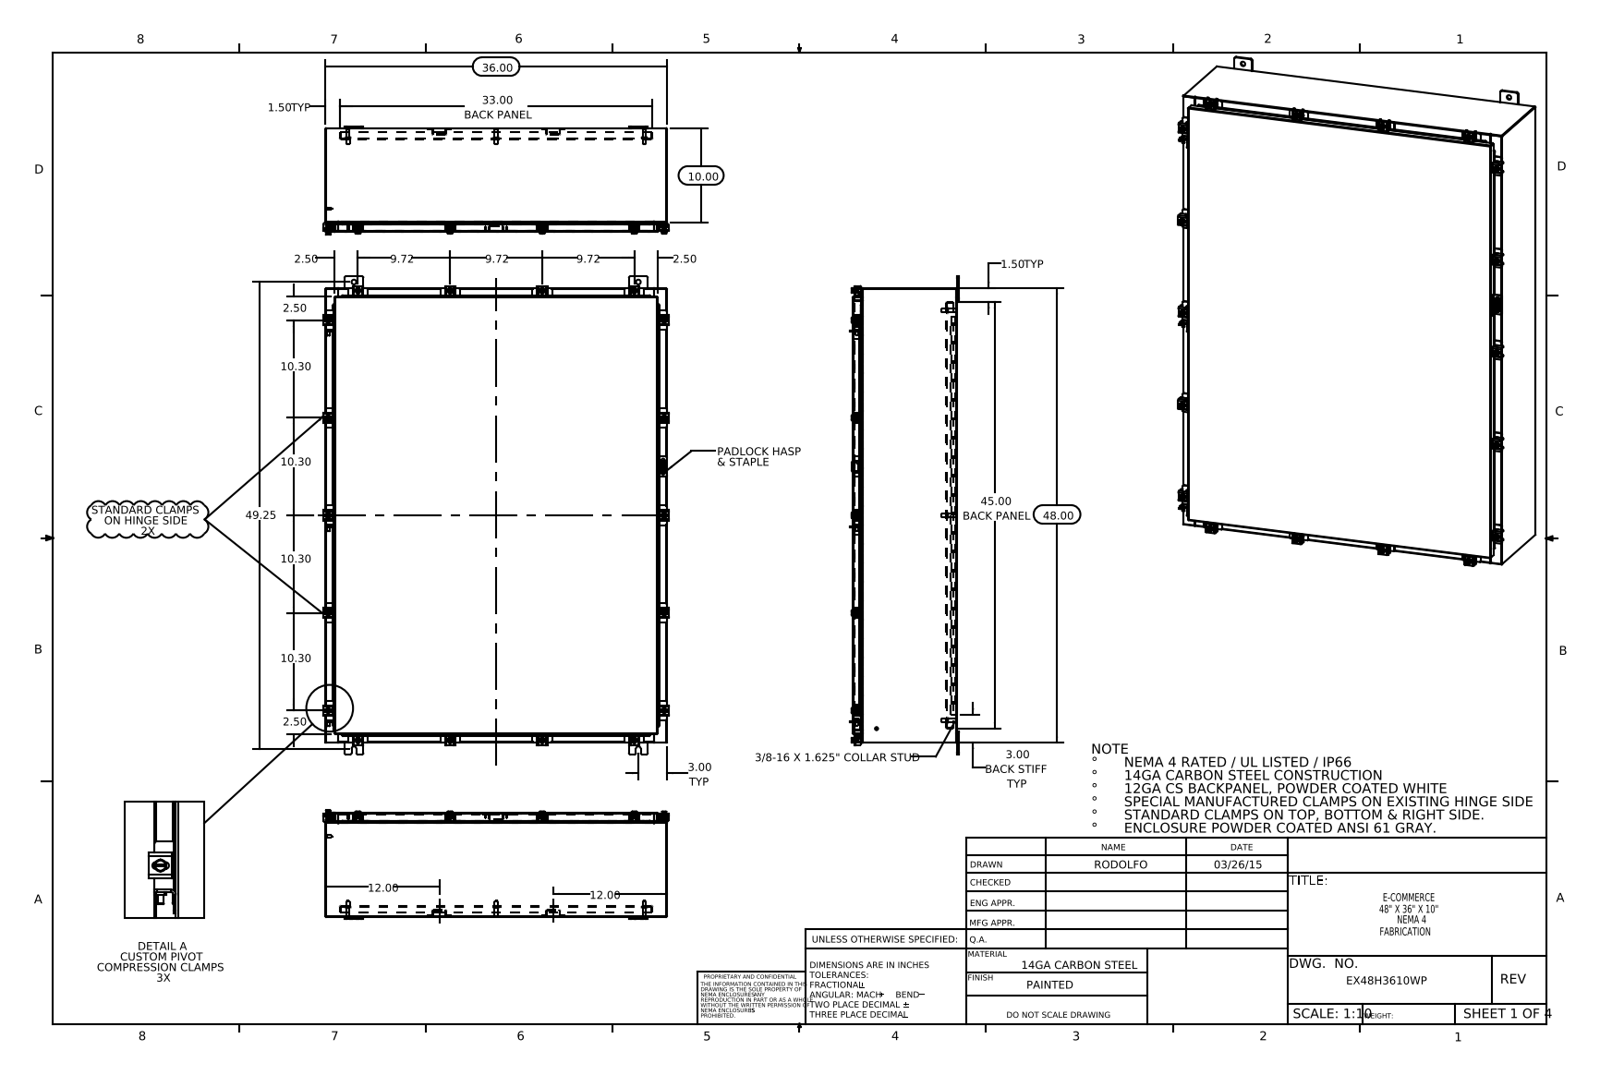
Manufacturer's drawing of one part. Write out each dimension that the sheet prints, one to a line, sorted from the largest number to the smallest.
49.25
48.00
45.00 BACK PANEL
36.00
33.00 BACK PANEL
12.00
12.00
10.30
10.30
10.30
10.30
10.00
9.72
9.72
9.72
3.00 TYP
3.00 BACK STIFF TYP
2.50
2.50
2.50
2.50
1.50 TYP
1.50 TYP
